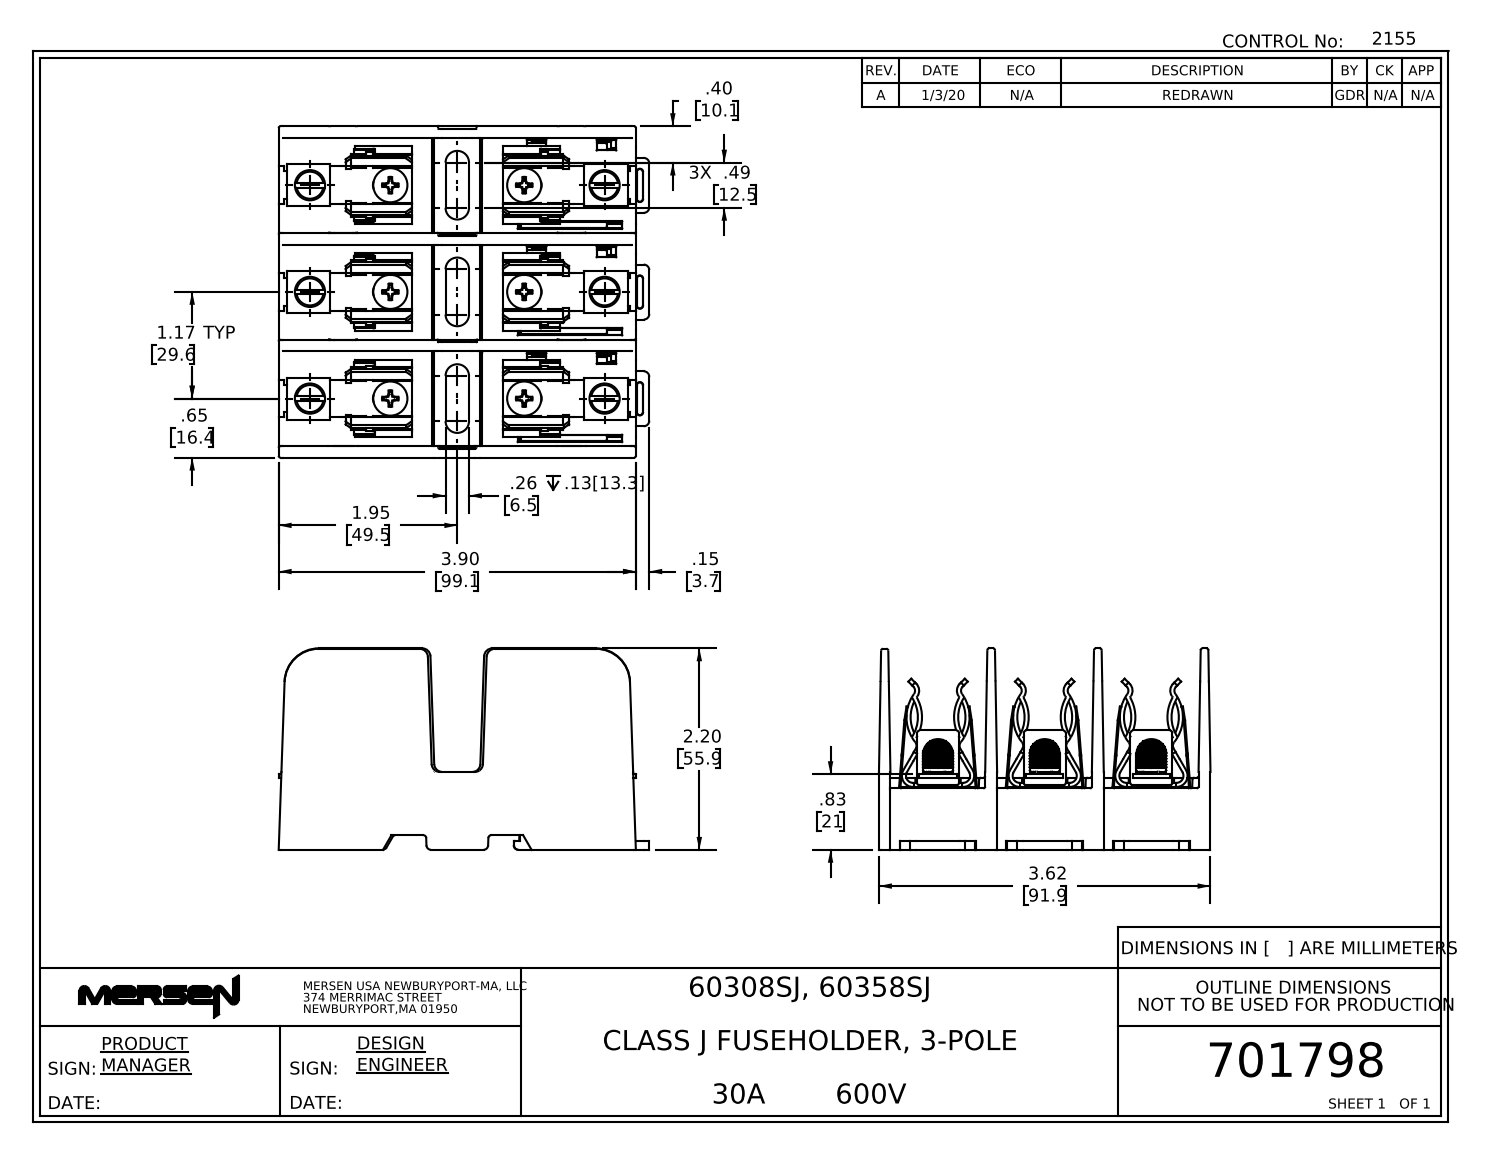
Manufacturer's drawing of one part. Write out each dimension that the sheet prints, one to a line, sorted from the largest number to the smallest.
3.90 99.1
3.62 91.9
2.20 55.9
1.95 49.5
1.17 29.6 TYP
.83 21
.65 16.4
3X .49 12.5
.40 10.1
.26 6.5 .13[13.3]
.15 3.7
